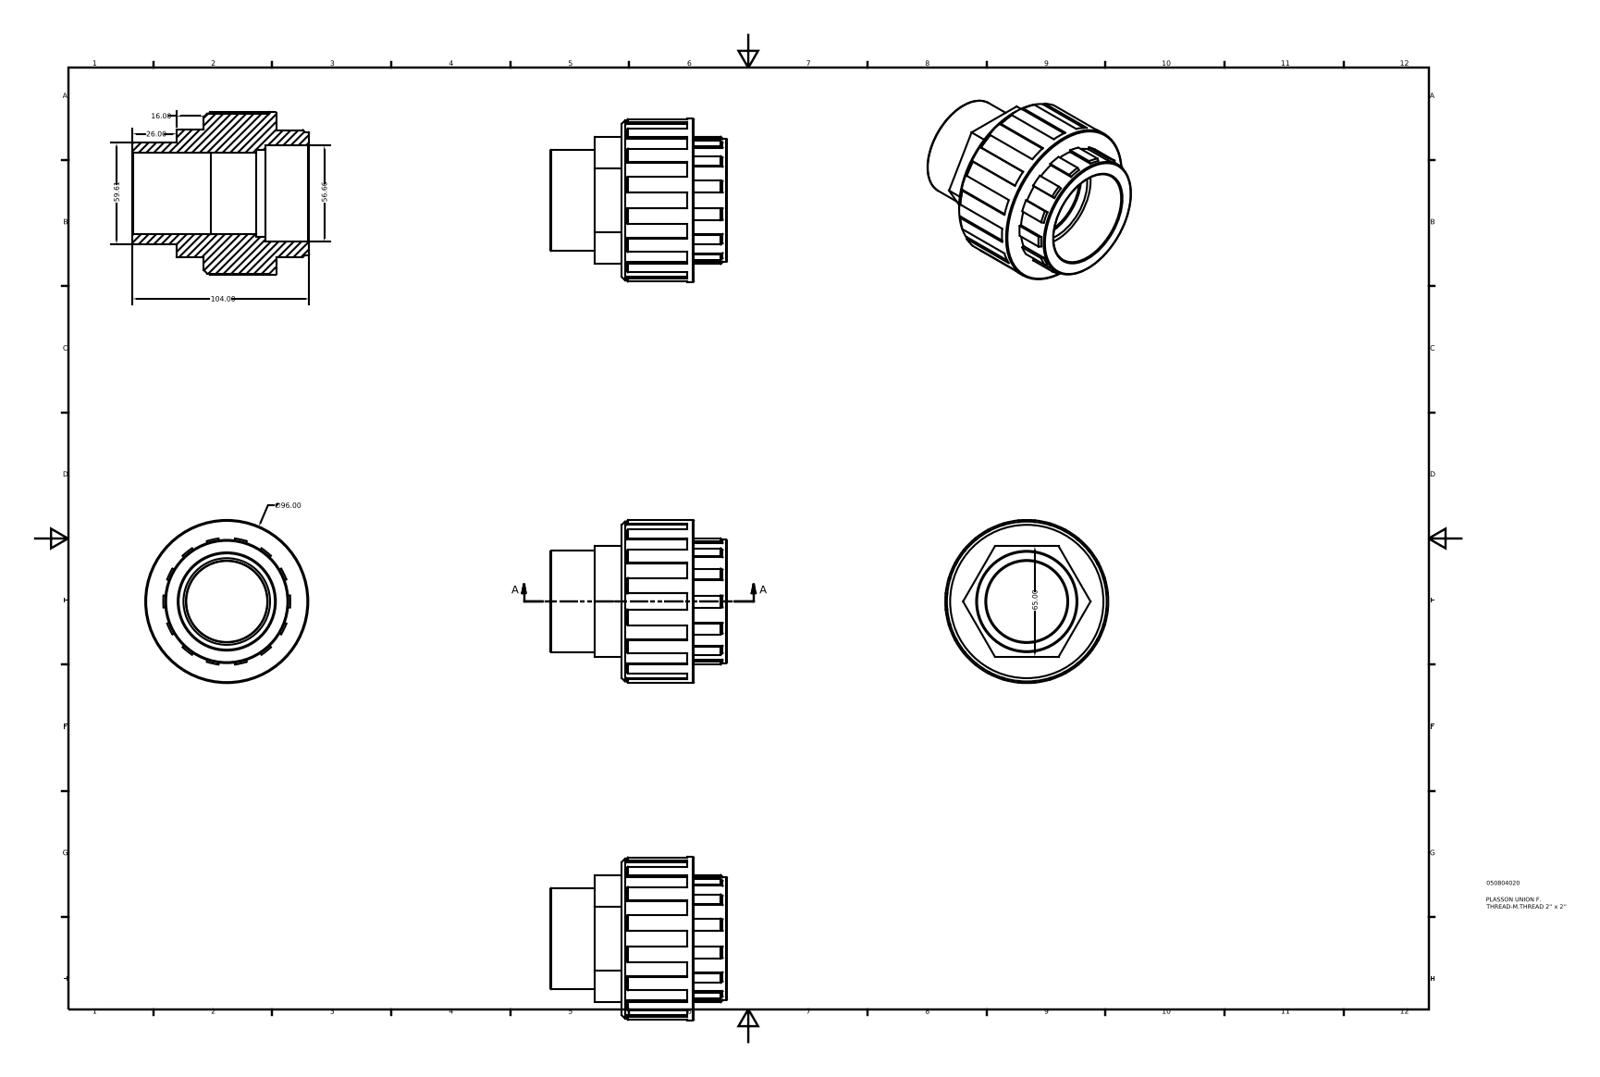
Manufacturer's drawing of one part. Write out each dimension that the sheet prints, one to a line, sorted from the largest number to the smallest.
104.00
∅96.00
65.00
59.61
56.66
26.00
16.00
